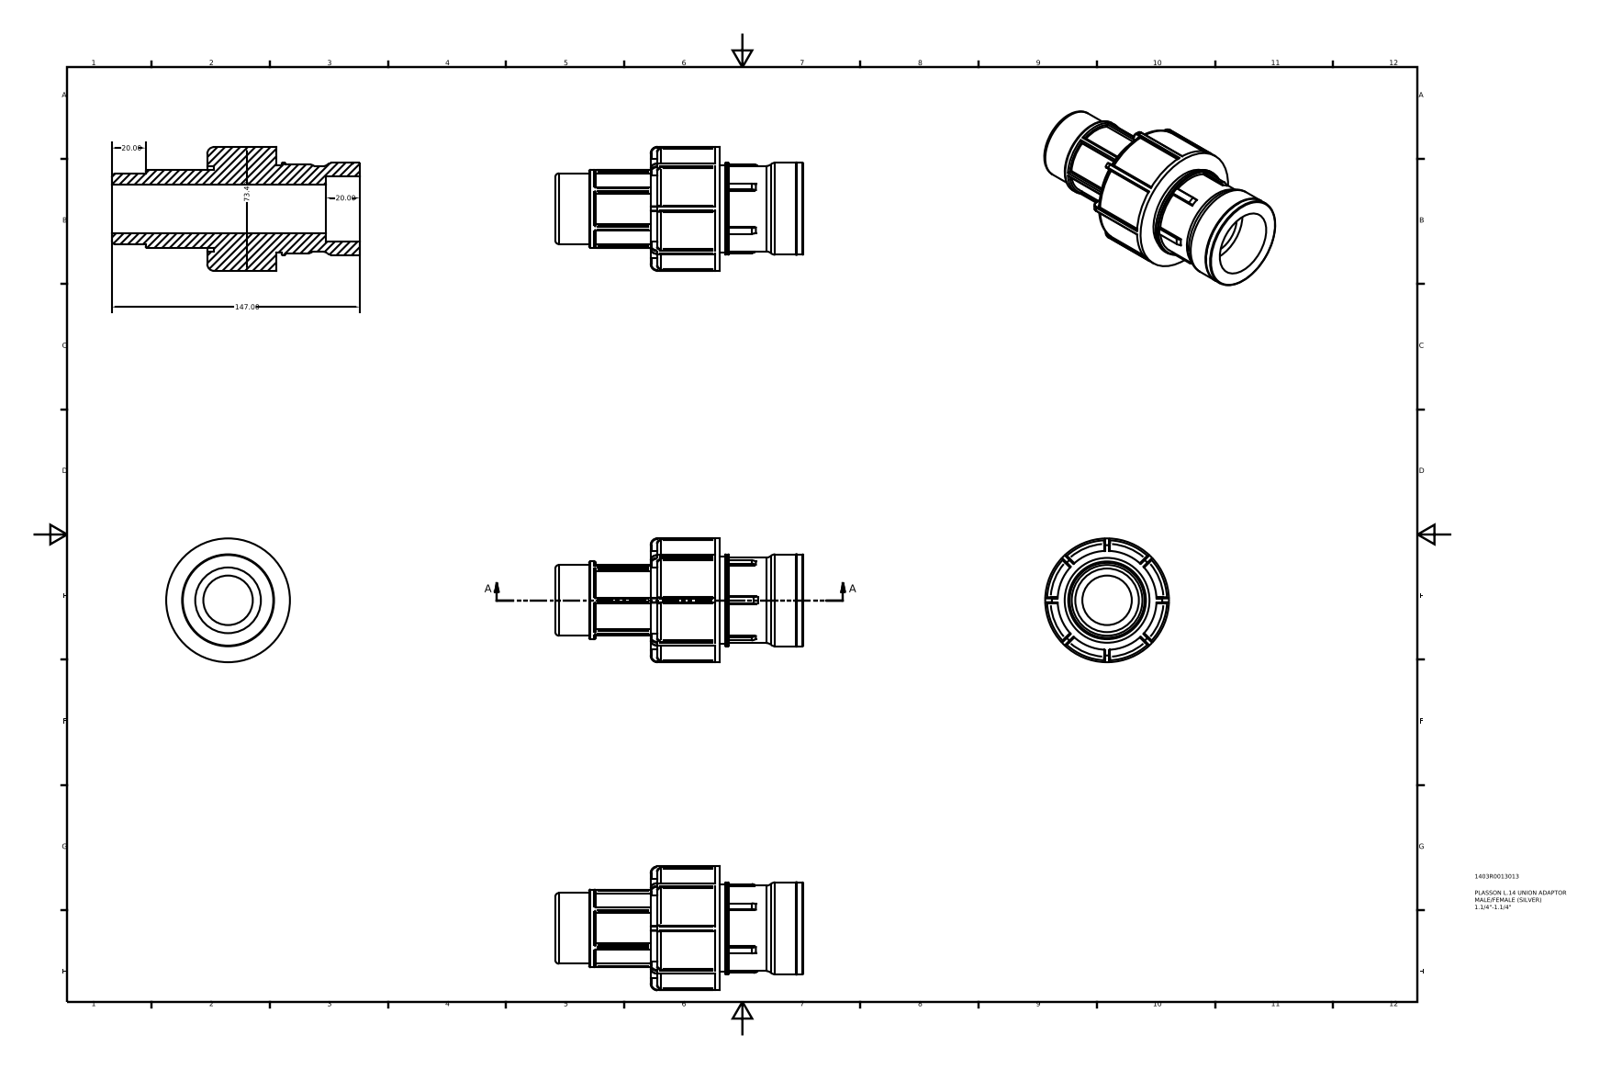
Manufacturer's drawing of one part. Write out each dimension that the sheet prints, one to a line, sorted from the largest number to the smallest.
147.00
73.40
20.00
20.00
